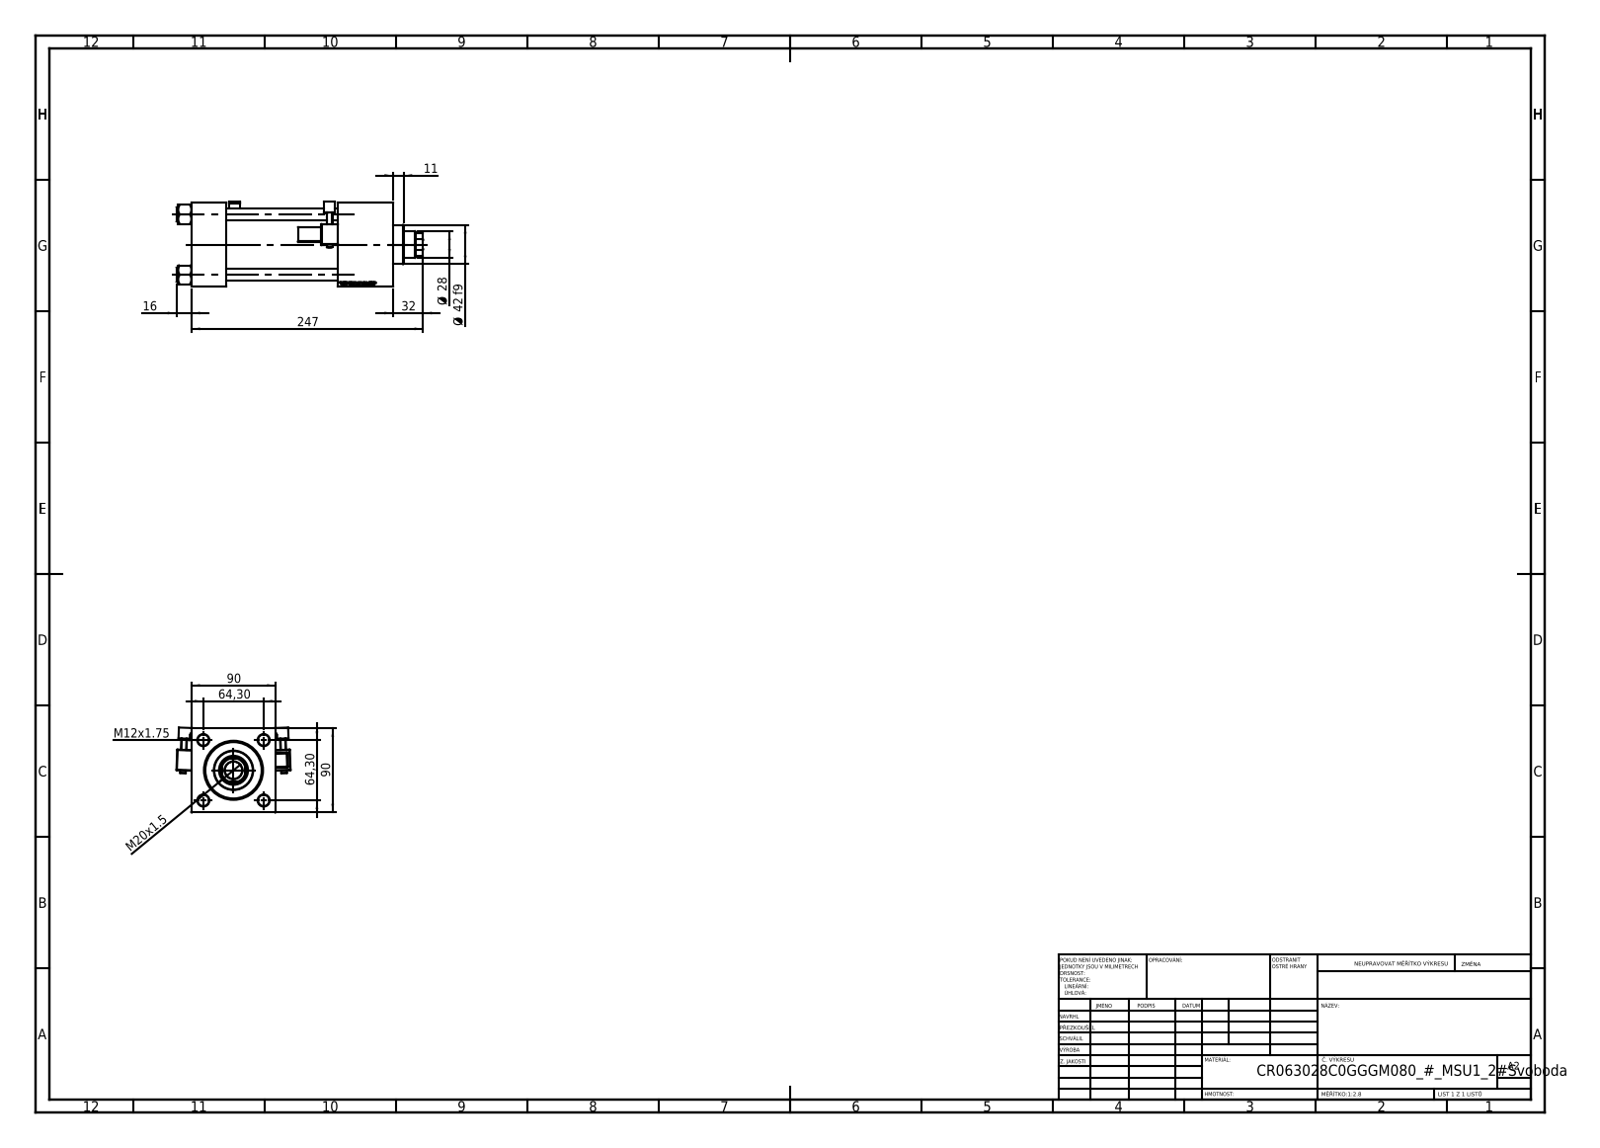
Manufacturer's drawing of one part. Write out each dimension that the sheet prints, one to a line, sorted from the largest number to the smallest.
247
90
90
64,30
64,30
Ø 42 f9
32
Ø 28
M20x1.5
16
M12x1.75
11
